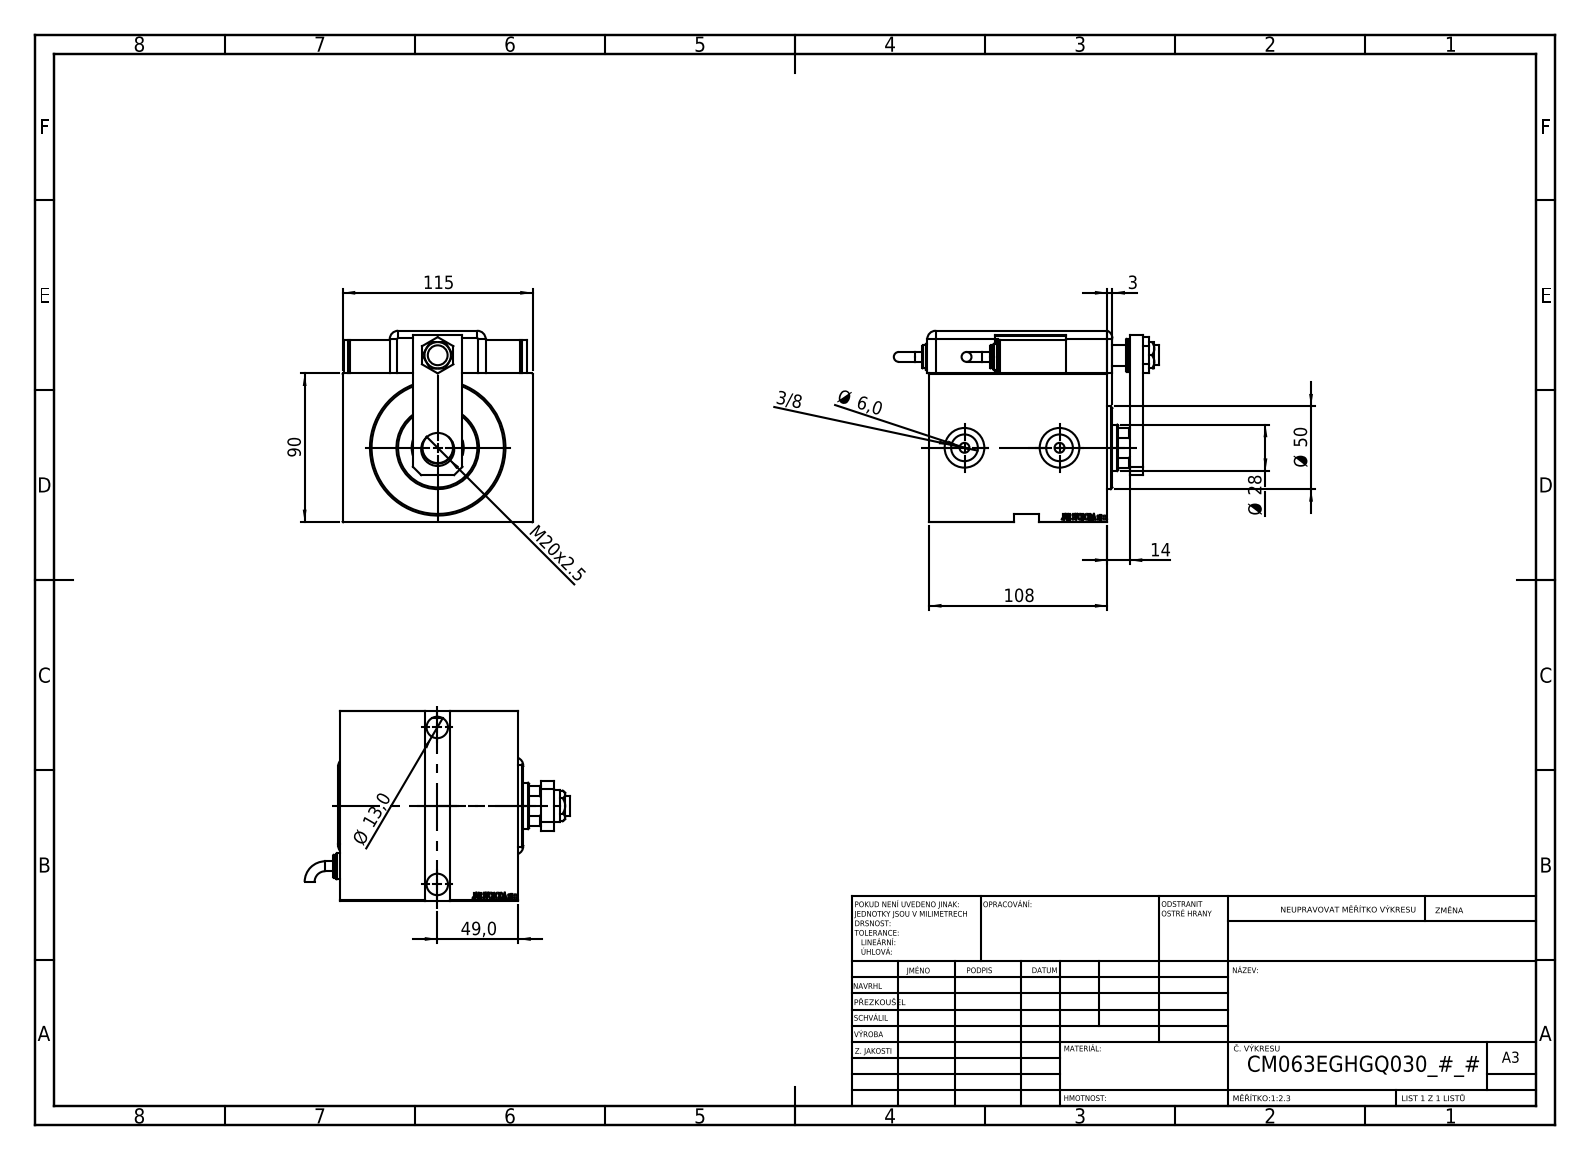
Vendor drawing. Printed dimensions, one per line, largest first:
115
108
90
Ø 50
49,0
Ø 28
M20x2.5
14
Ø 13,0
Ø 6,0
3
3/8
